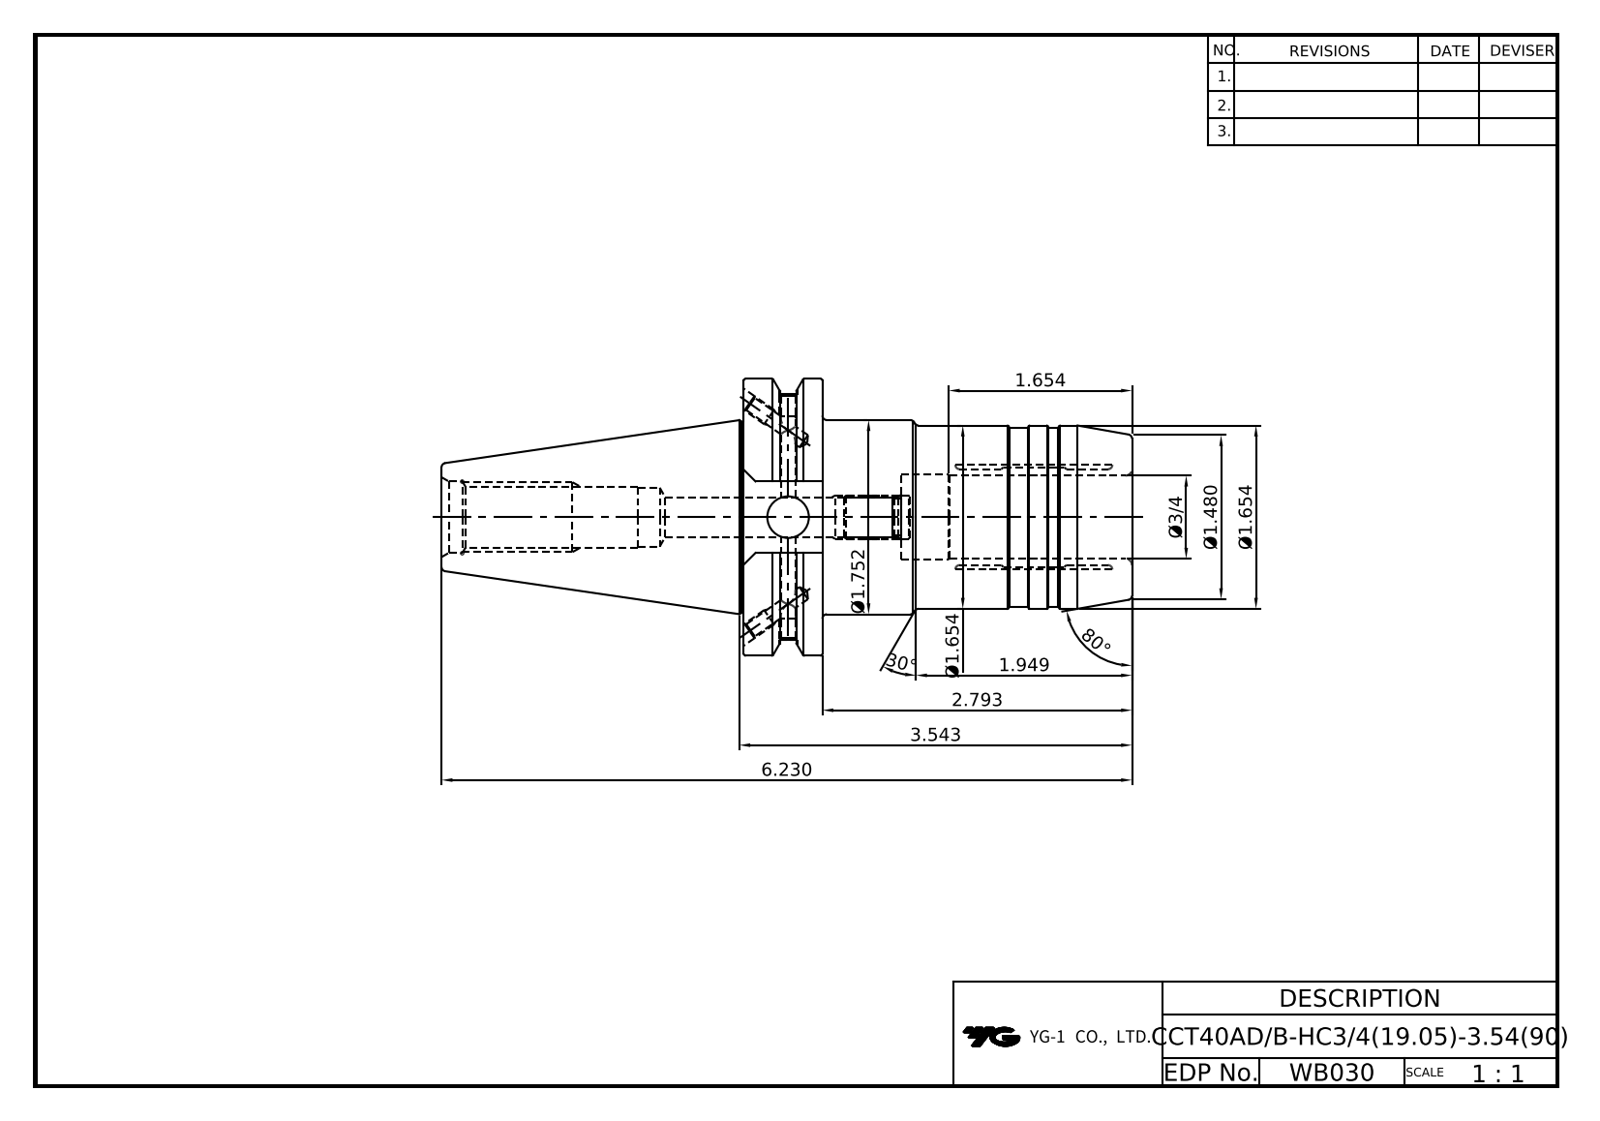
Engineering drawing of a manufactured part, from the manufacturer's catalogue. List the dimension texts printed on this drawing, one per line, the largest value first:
80°
30°
6.230
3.543
2.793
1.949
Ø1.752
Ø1.654
Ø1.654
1.654
Ø1.480
Ø3/4
